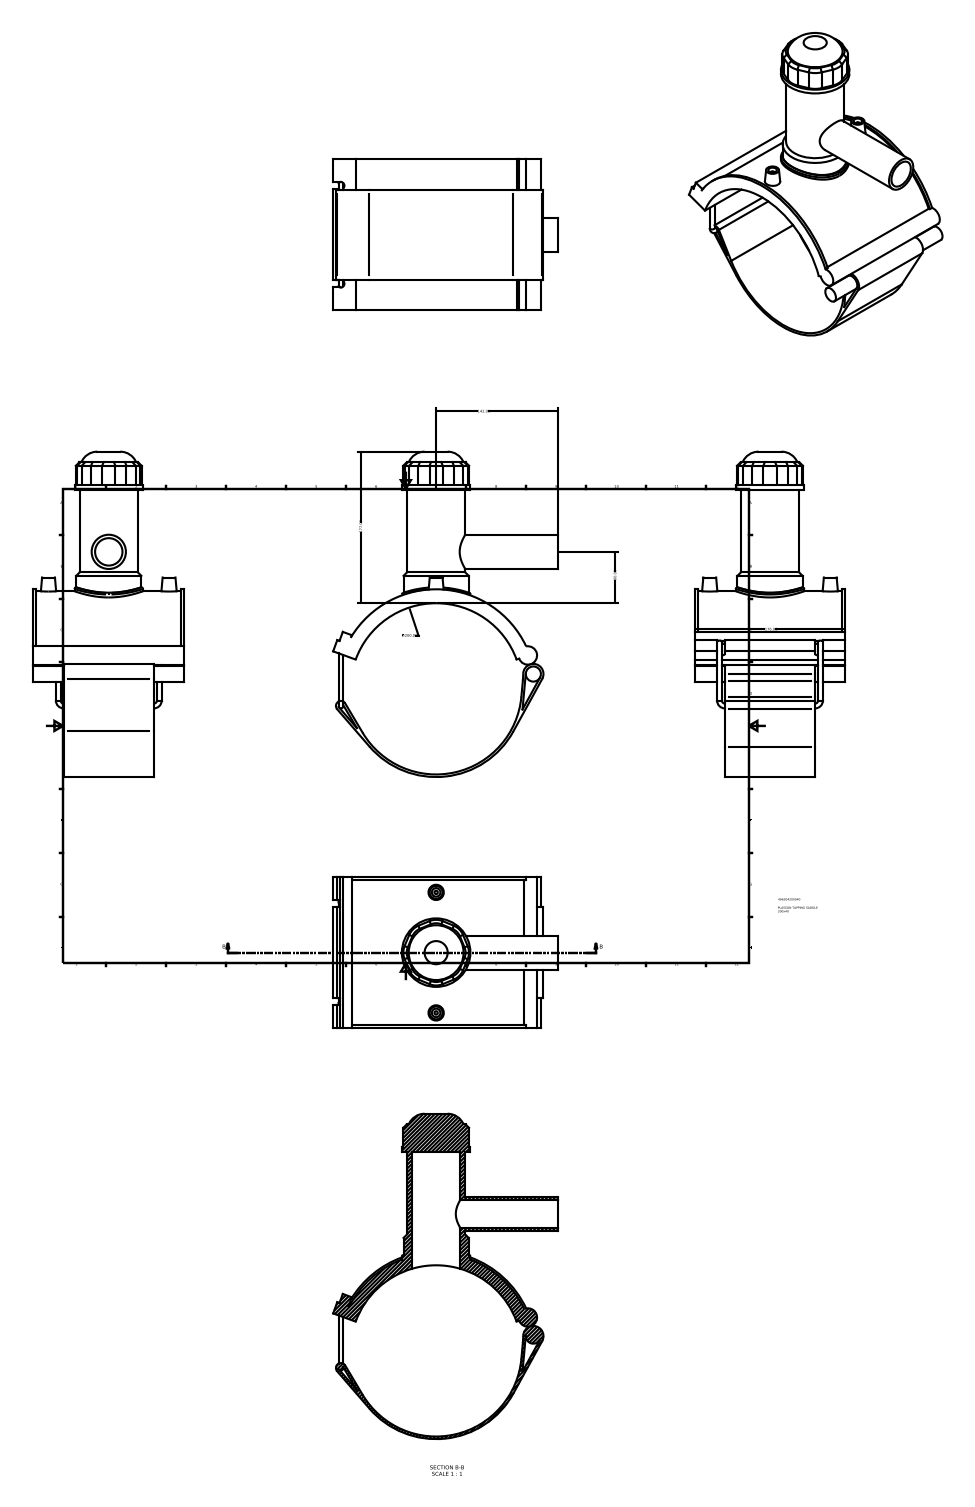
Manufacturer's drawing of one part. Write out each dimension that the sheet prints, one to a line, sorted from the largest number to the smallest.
∅200.00
177.00
176.00
142.00
60.00
